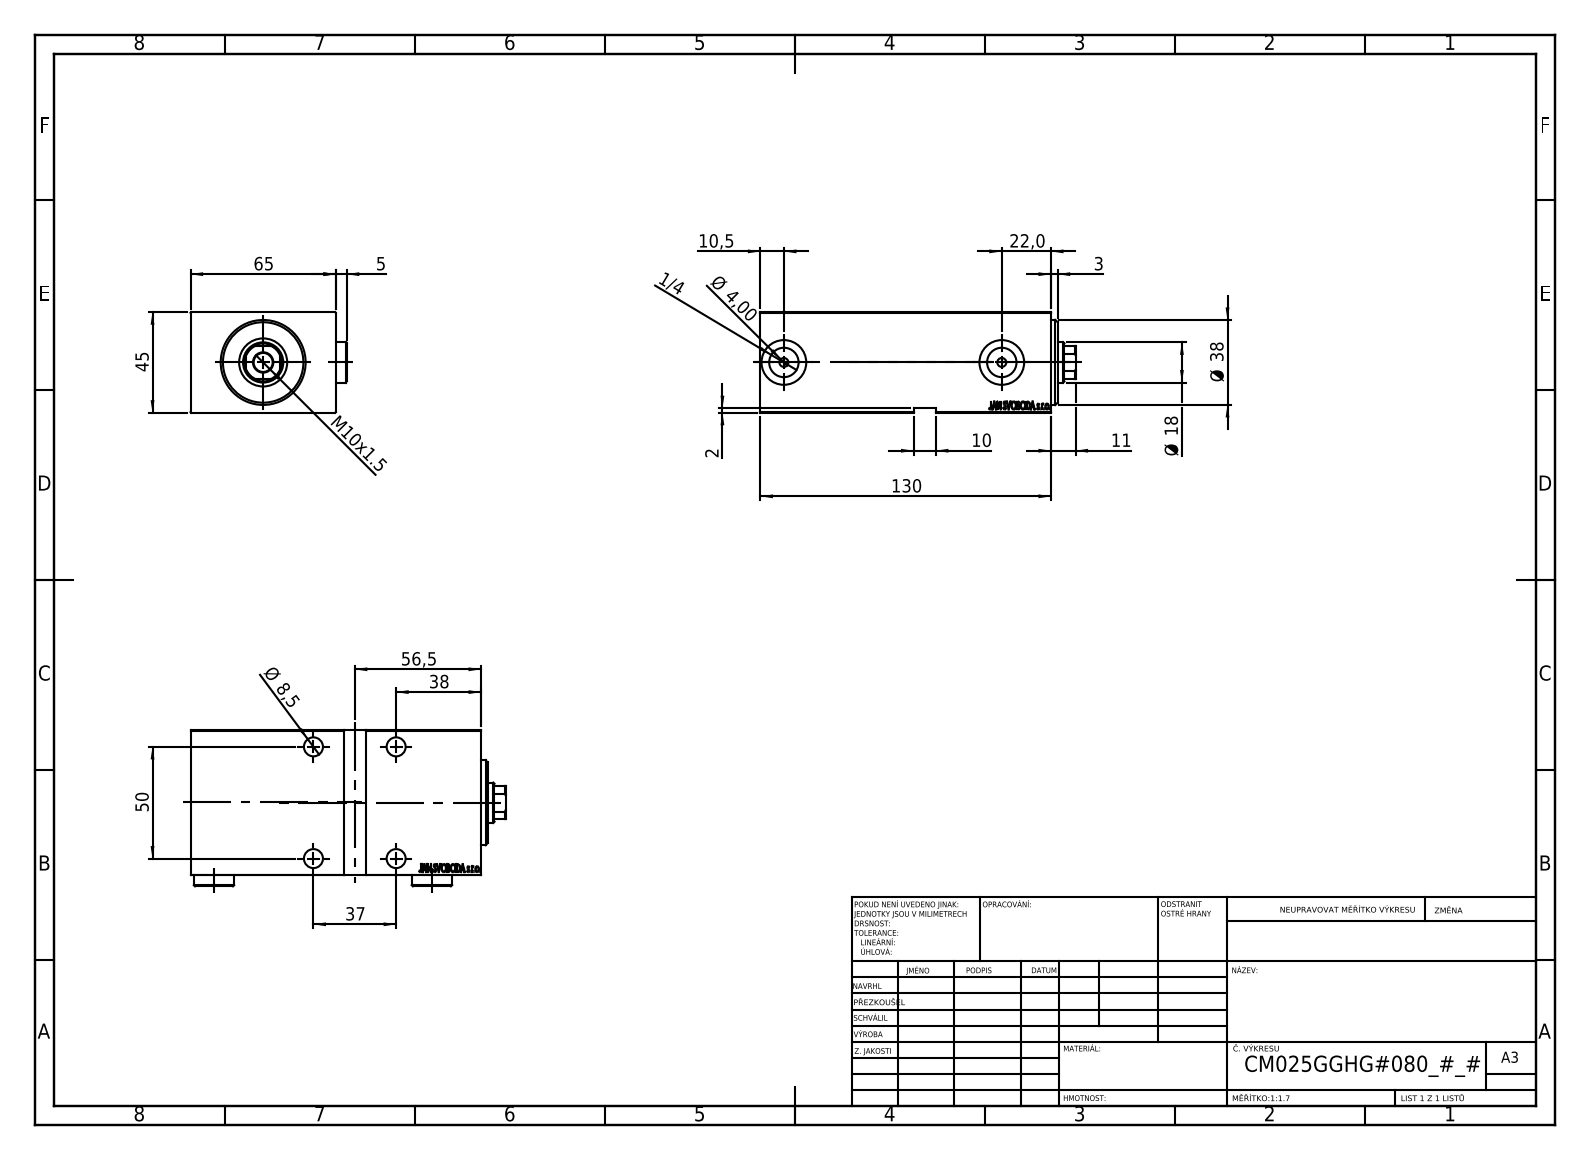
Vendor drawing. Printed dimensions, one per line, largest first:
130
65
56,5
50
45
Ø 38
38
37
22,0
Ø 18
11
10,5
M10x1.5
10
Ø 8,5
5
Ø 4,00
3
2
1/4
